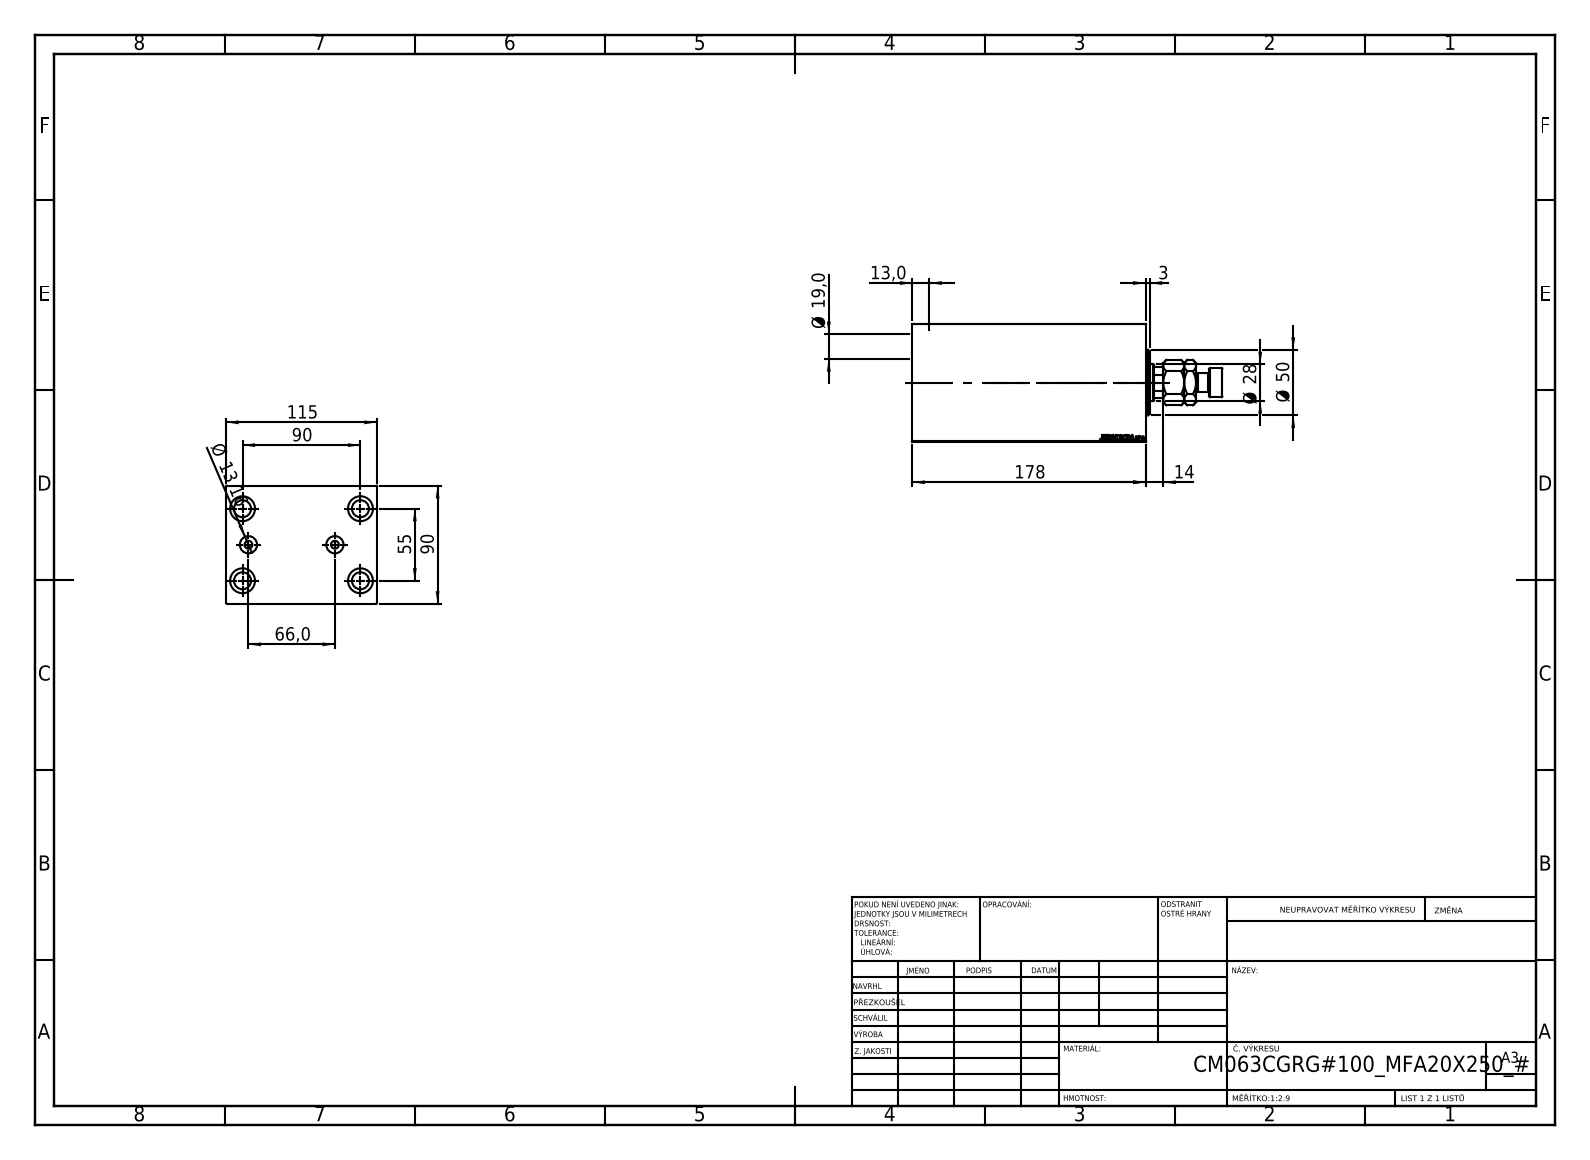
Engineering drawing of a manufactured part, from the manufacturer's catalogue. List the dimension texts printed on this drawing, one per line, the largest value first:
178
115
90
90
66,0
55
Ø 50
Ø 28
Ø 19,0
14
Ø 13,16
13,0
3
